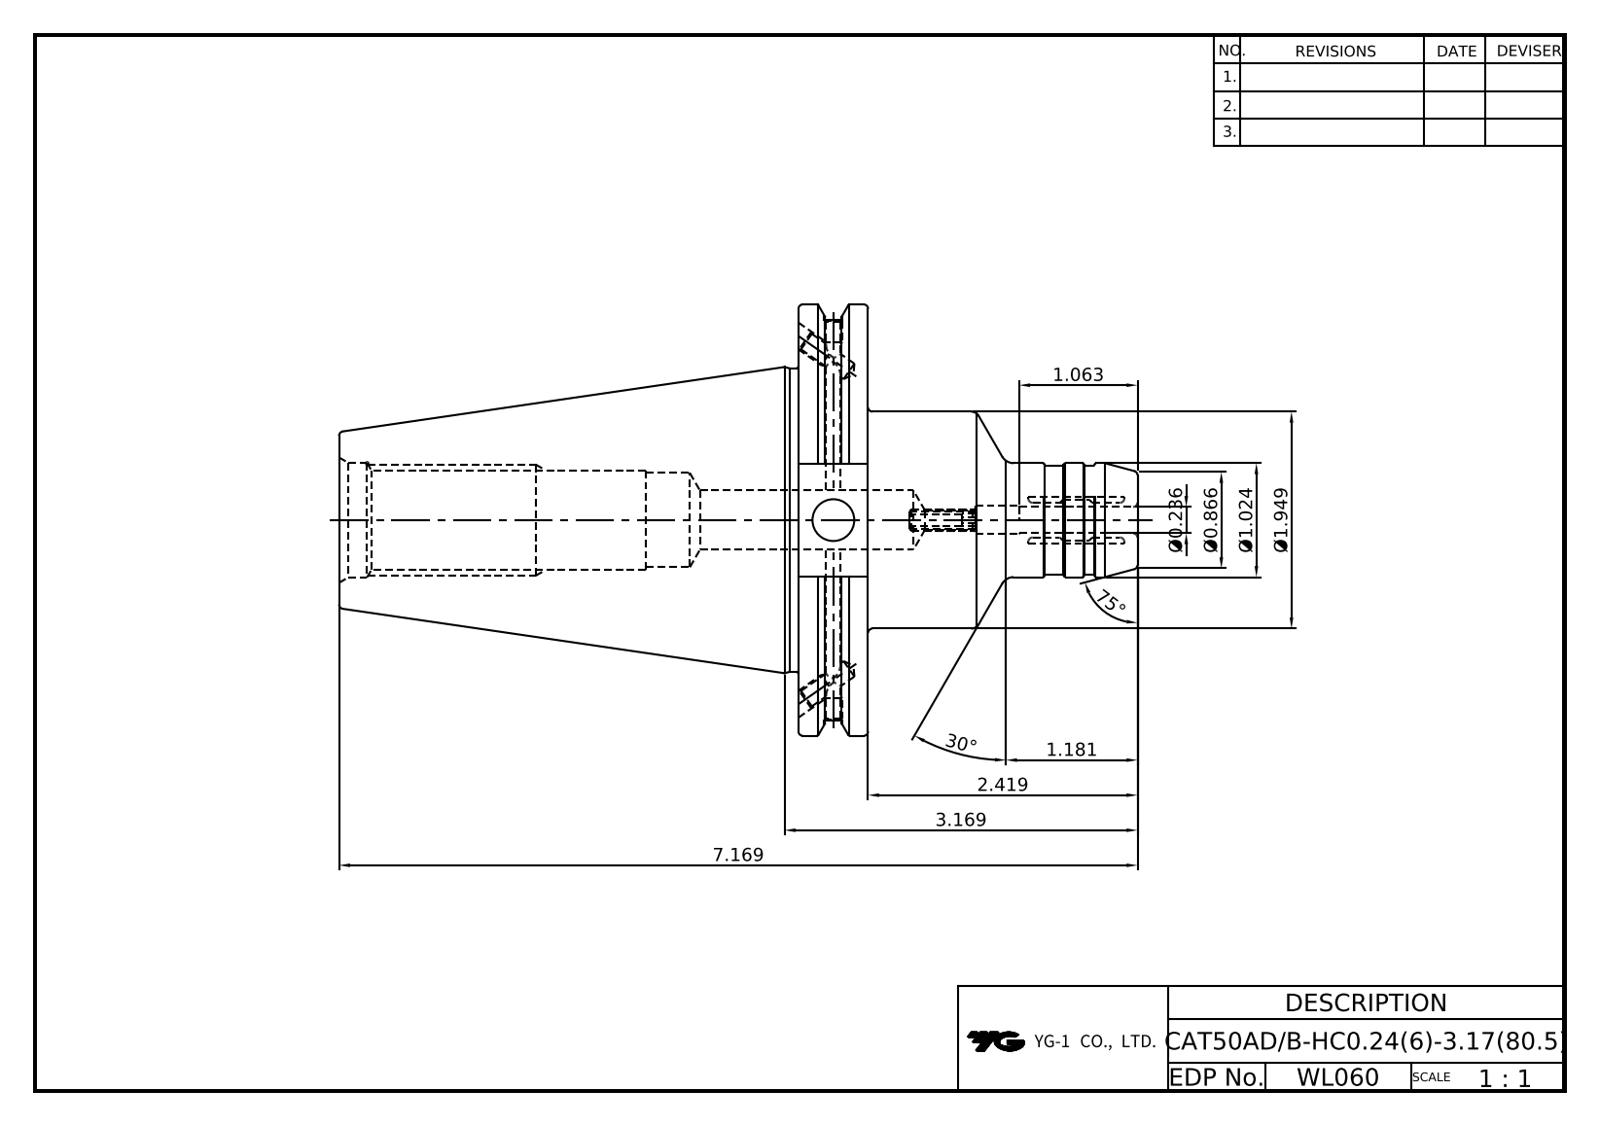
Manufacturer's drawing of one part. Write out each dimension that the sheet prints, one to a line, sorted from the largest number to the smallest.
75°
30°
7.169
3.169
2.419
Ø1.949
1.181
1.063
Ø1.024
Ø0.866
Ø0.236
